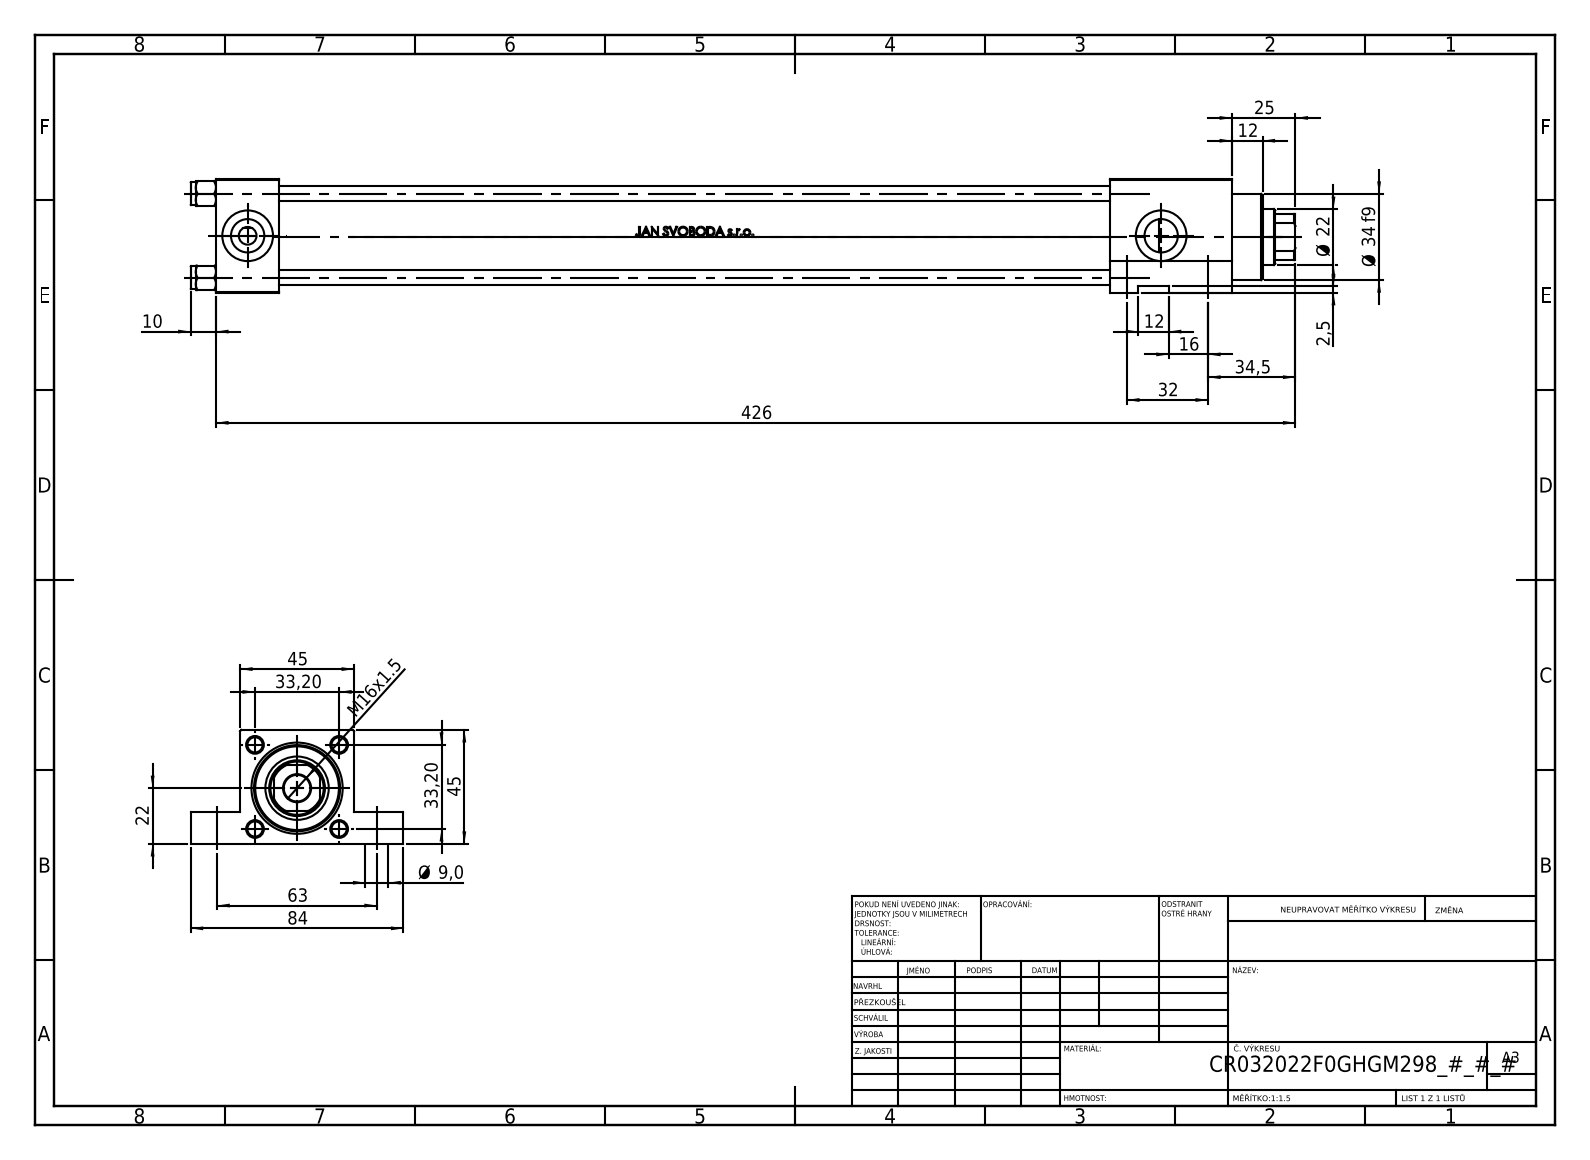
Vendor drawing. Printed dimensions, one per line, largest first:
426
84
63
45
45
34,5
Ø 34 f9
33,20
33,20
32
25
Ø 22
22
16
M16x1.5
12
12
10
Ø 9,0
2,5
